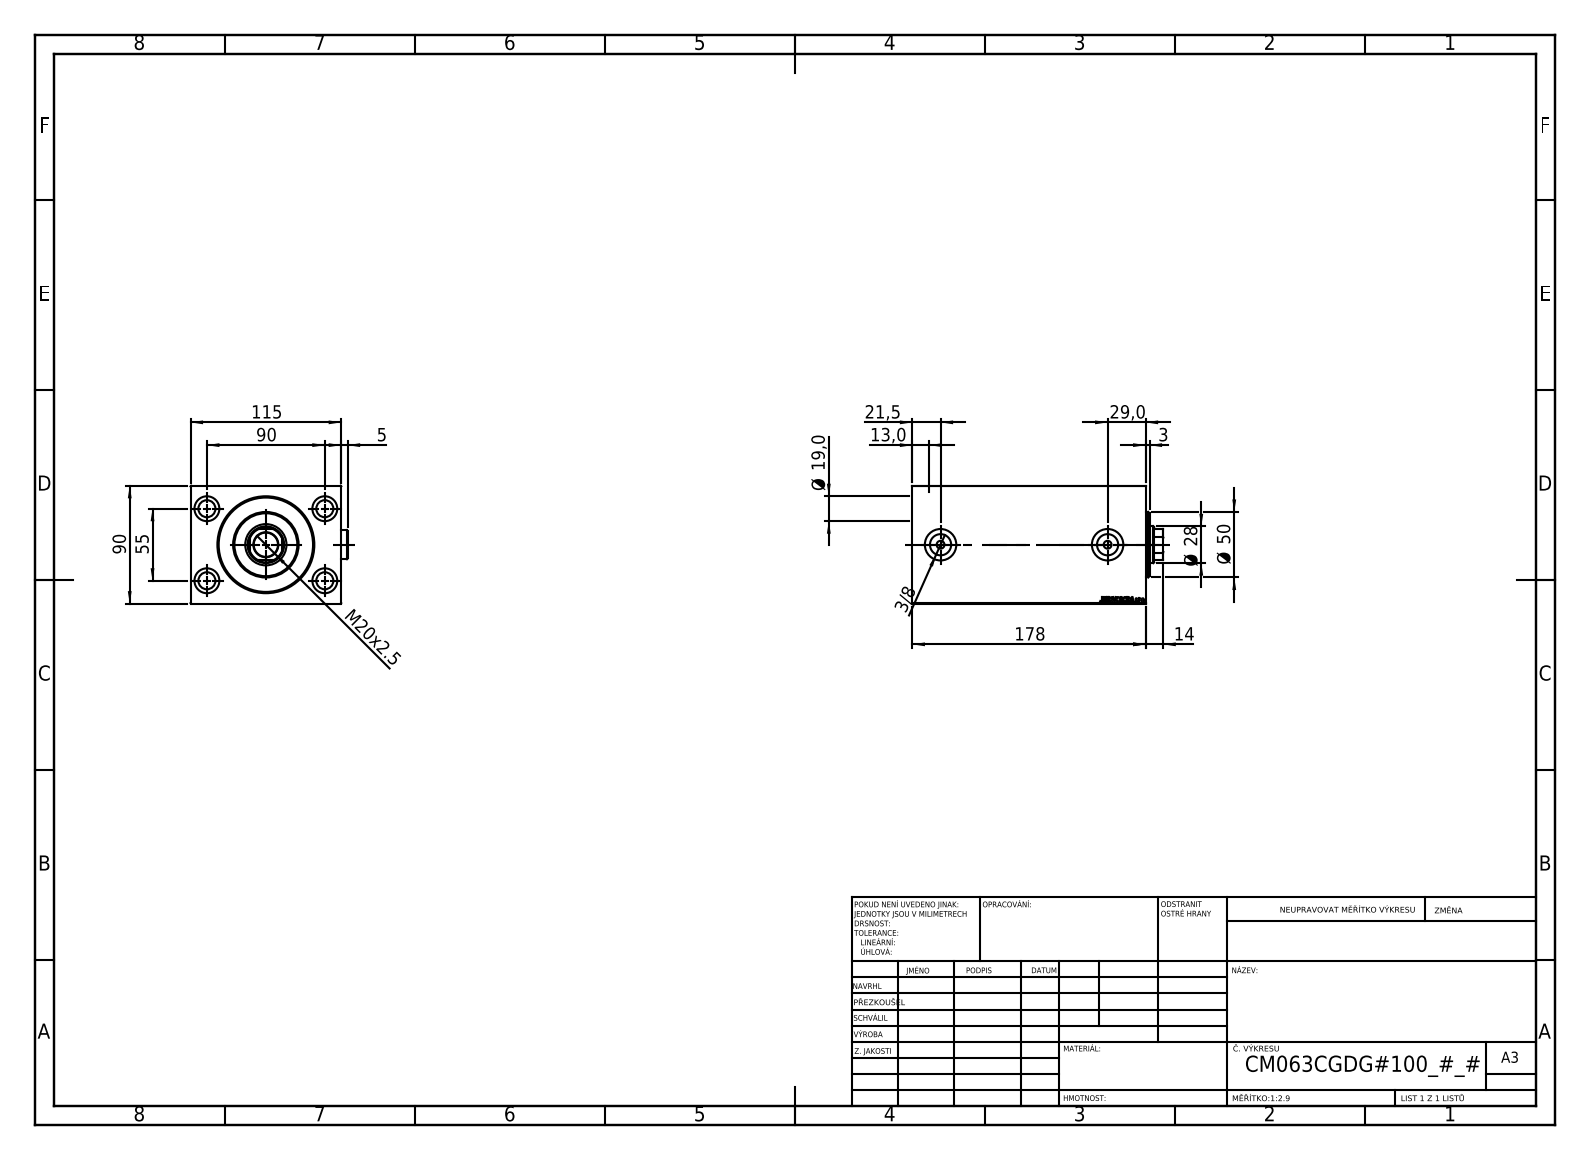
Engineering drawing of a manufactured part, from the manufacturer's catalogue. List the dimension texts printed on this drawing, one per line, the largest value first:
178
115
90
90
55
Ø 50
29,0
Ø 28
21,5
M20x2.5
Ø 19,0
14
13,0
5
3
3/8
